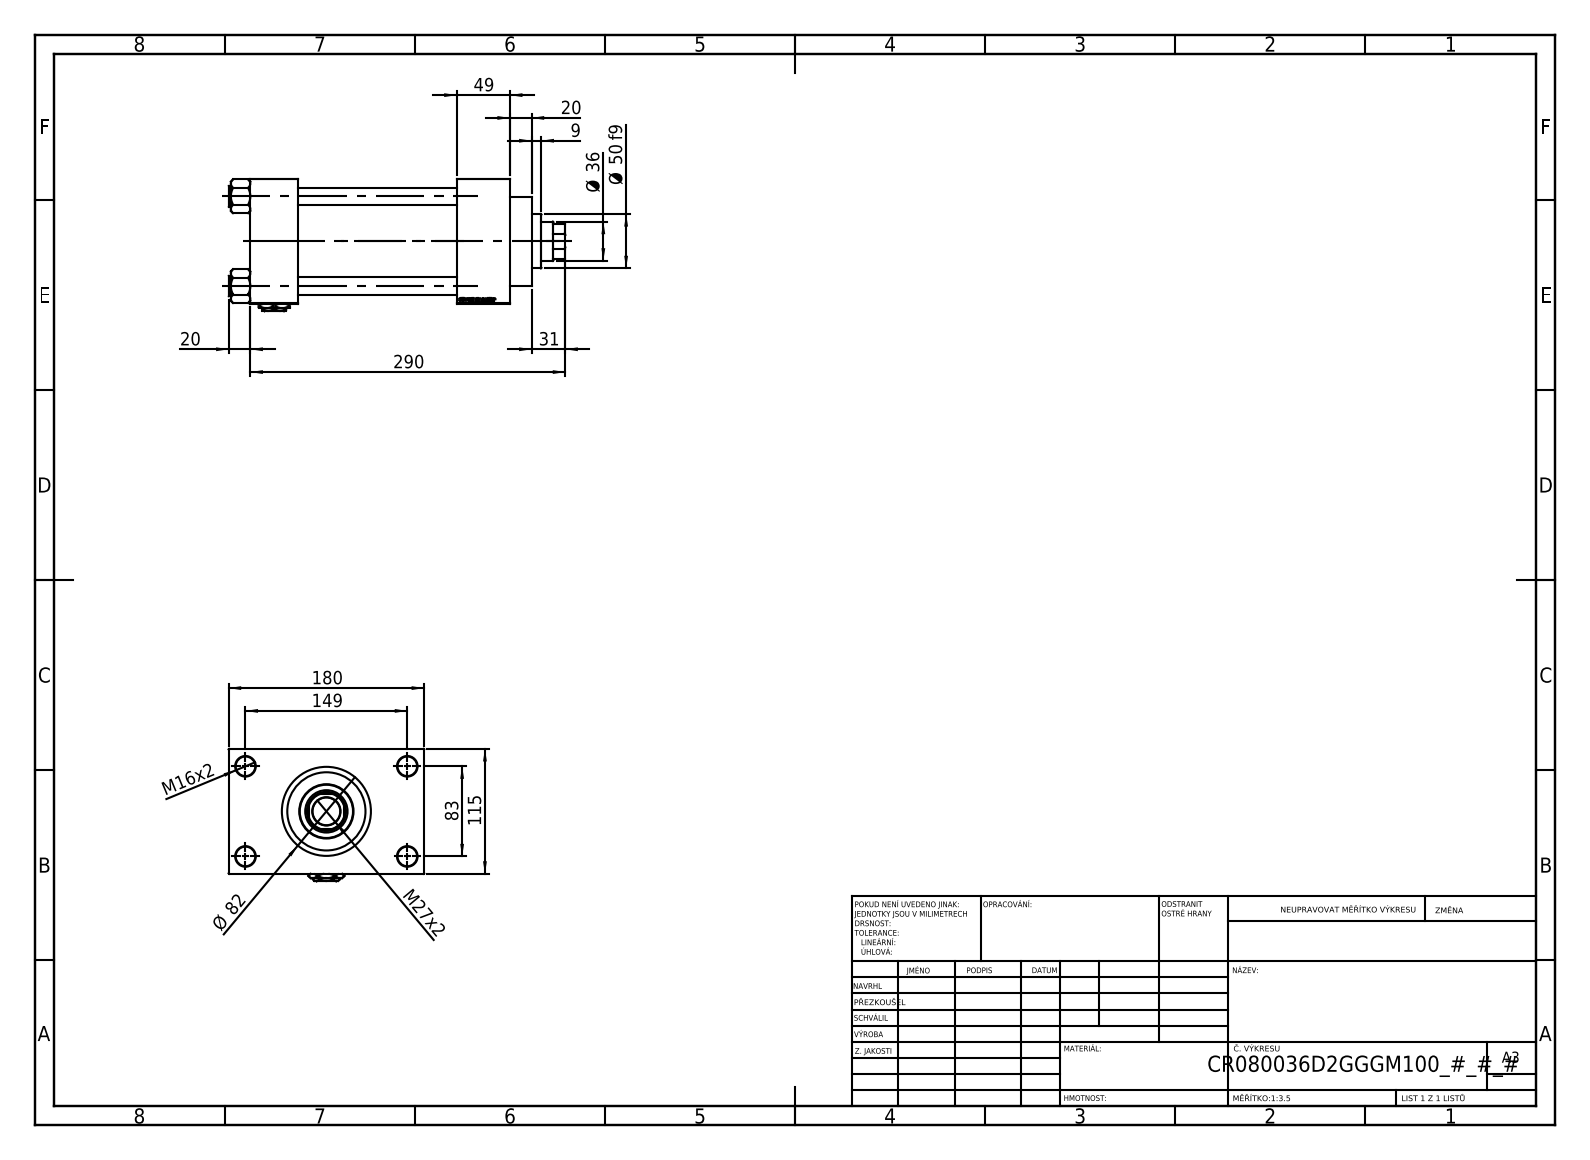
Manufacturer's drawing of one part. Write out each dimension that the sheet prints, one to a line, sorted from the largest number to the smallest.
290
180
149
115
83
Ø 82
Ø 50 f9
49
Ø 36
31
M27x2
20
20
M16x2
9
